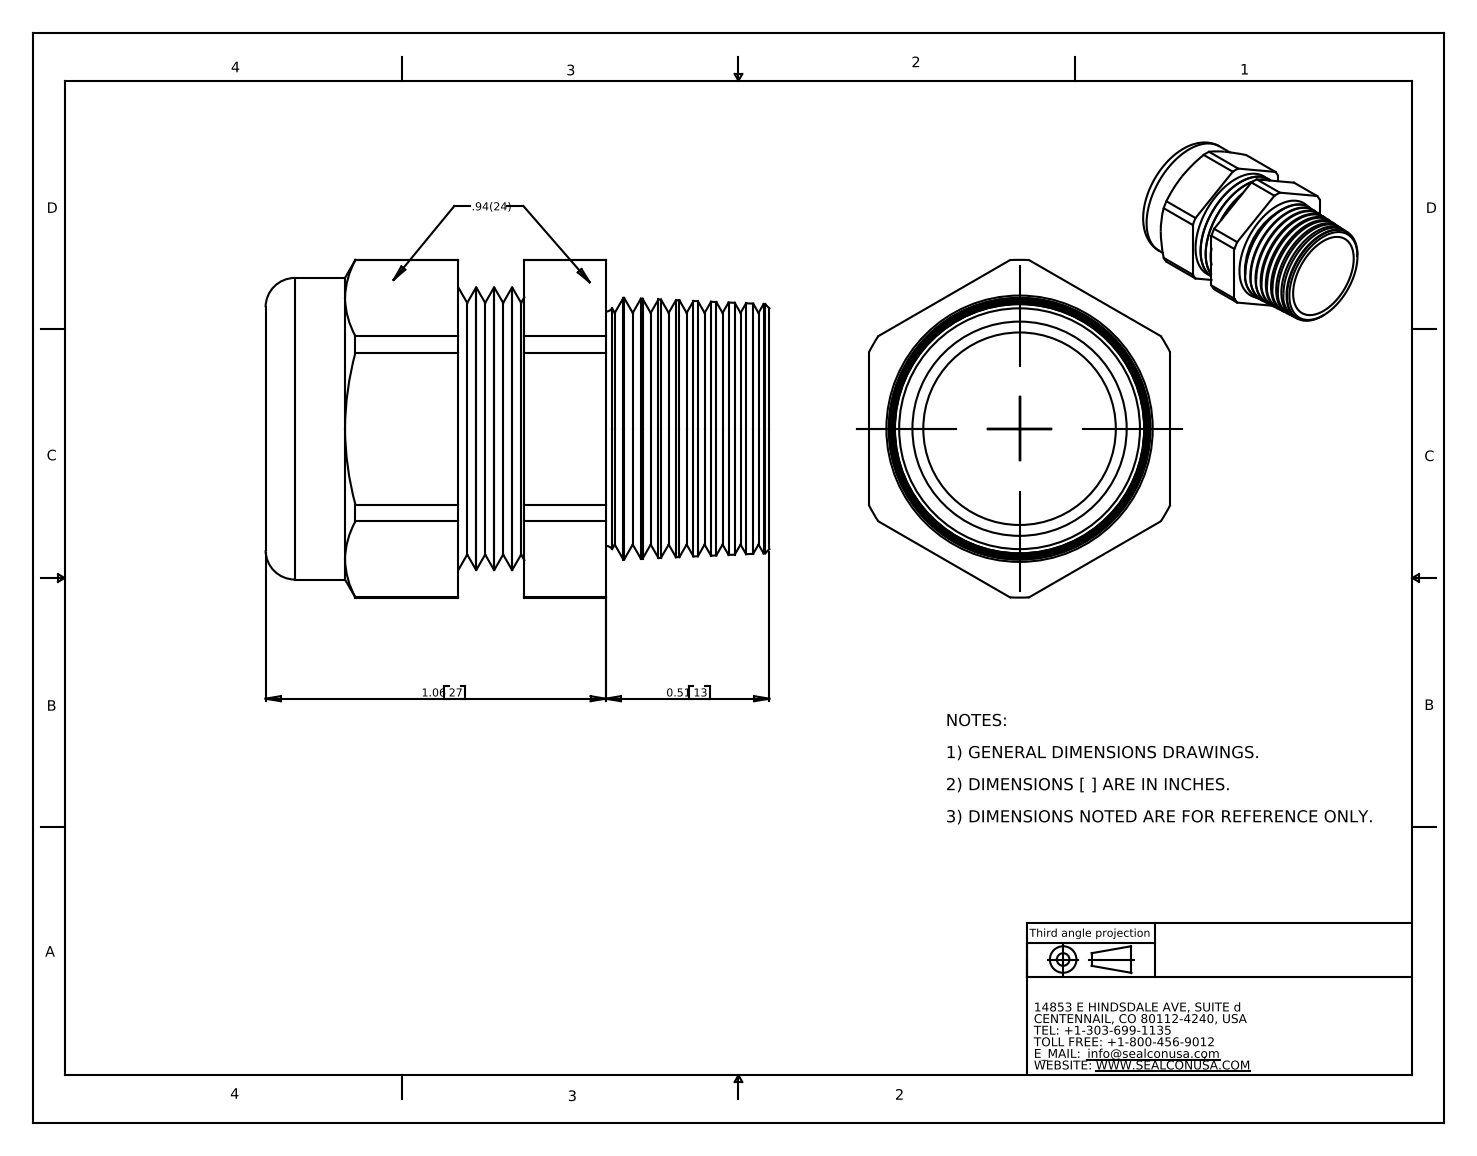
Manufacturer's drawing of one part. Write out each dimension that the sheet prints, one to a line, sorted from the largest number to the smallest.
1.06 27
0.51 13
